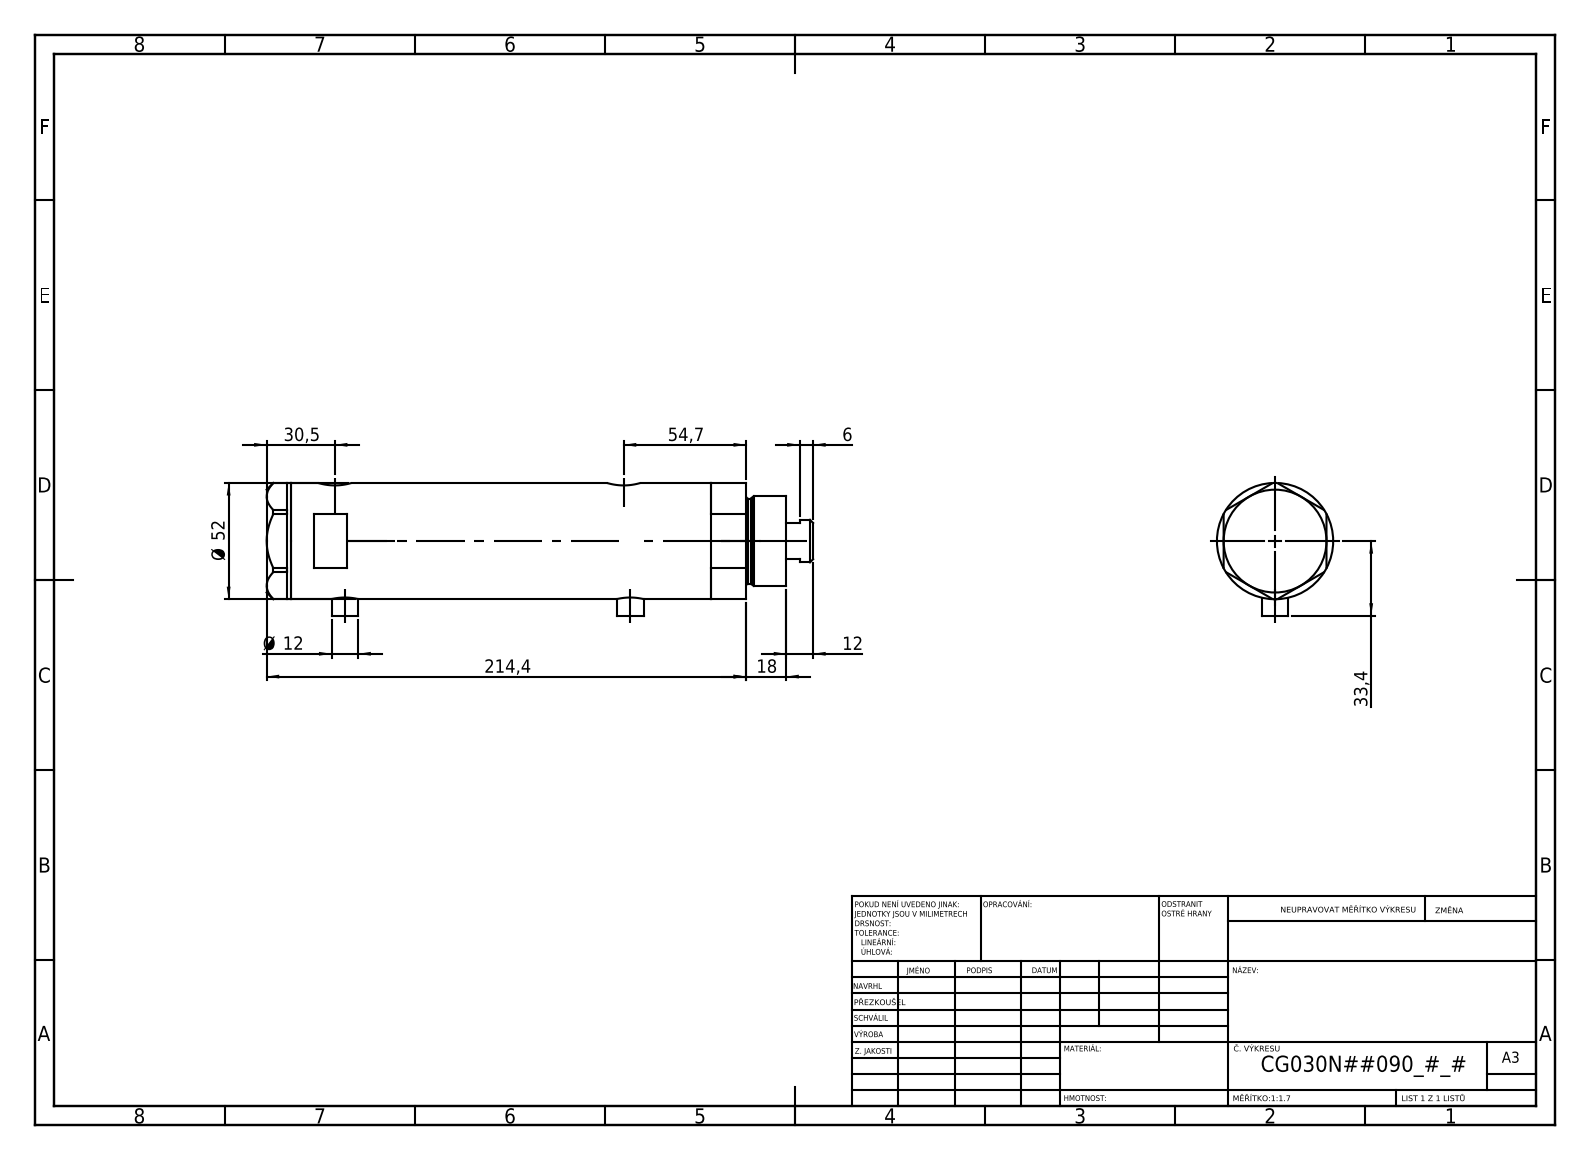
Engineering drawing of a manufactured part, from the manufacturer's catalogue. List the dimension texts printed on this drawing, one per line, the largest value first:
214,4
54,7
Ø 52
33,4
30,5
18
12
Ø 12
6
